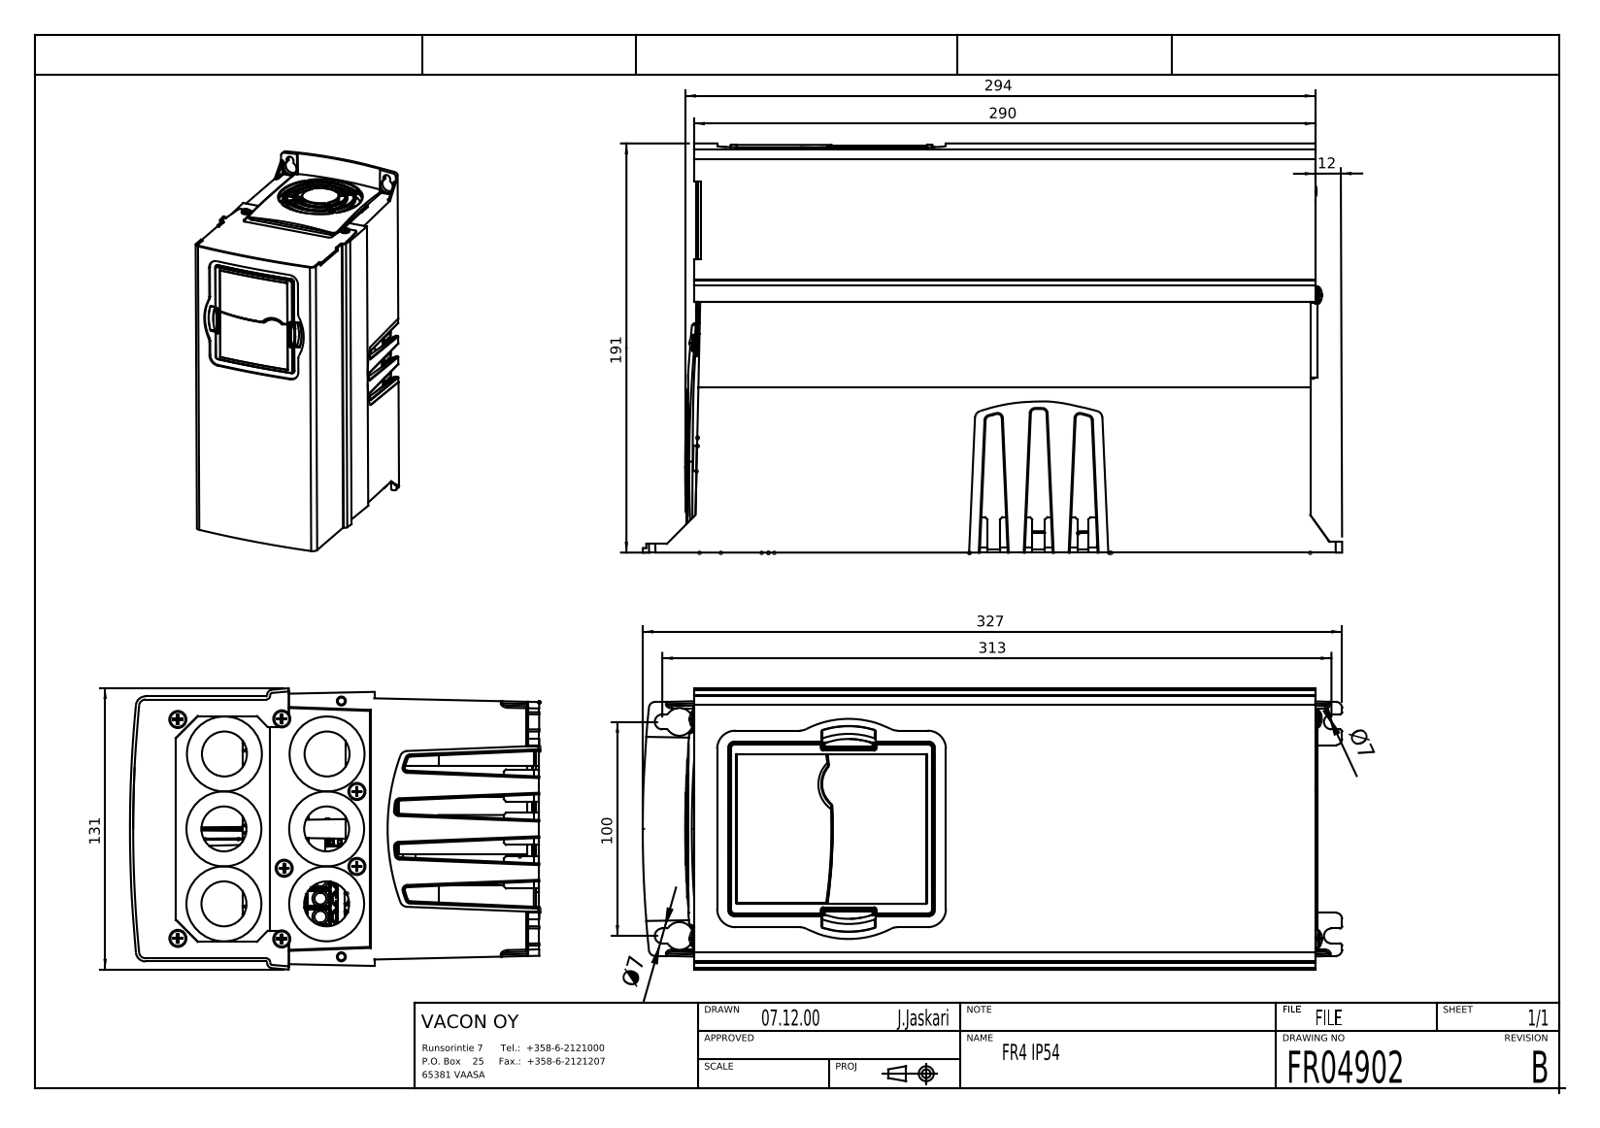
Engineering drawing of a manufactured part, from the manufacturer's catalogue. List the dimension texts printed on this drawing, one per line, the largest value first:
327
312.50
294
290
191
131
100
12
Ø7
Ø7
